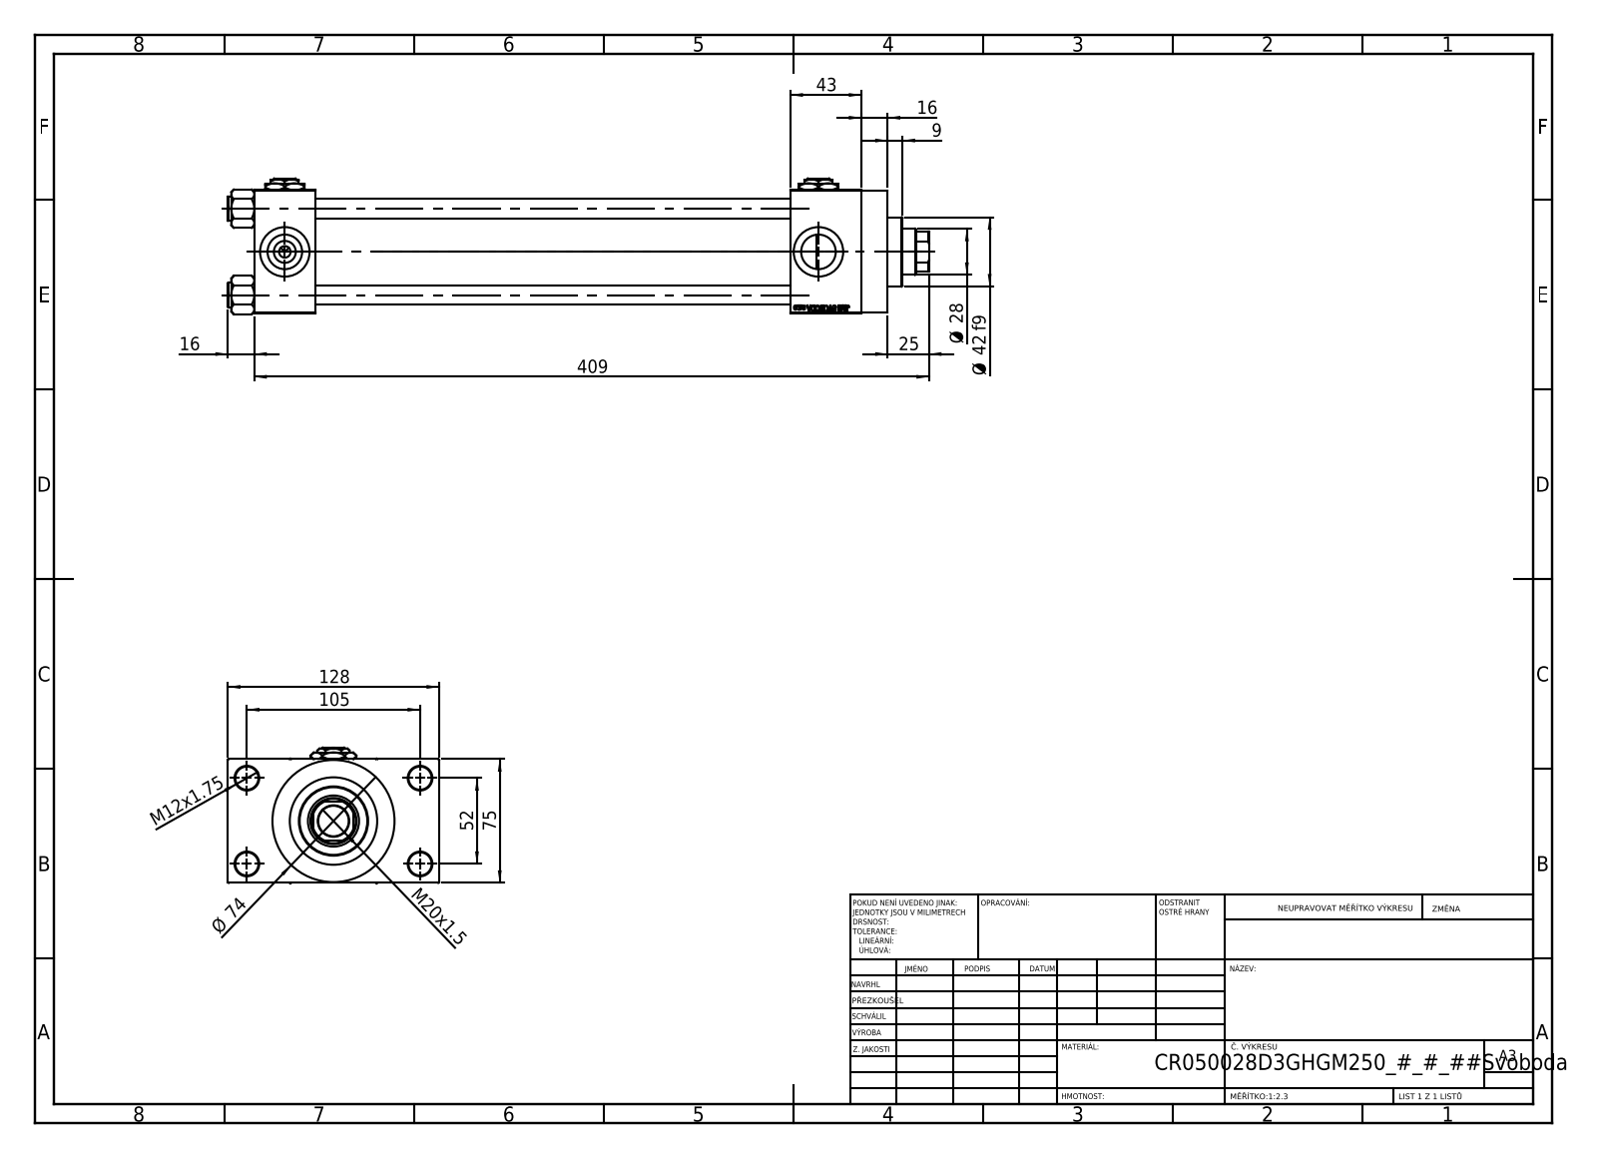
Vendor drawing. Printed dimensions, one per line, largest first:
409
128
105
75
Ø 74
52
43
Ø 42 f9
Ø 28
25
M20x1.5
16
16
M12x1.75
9
